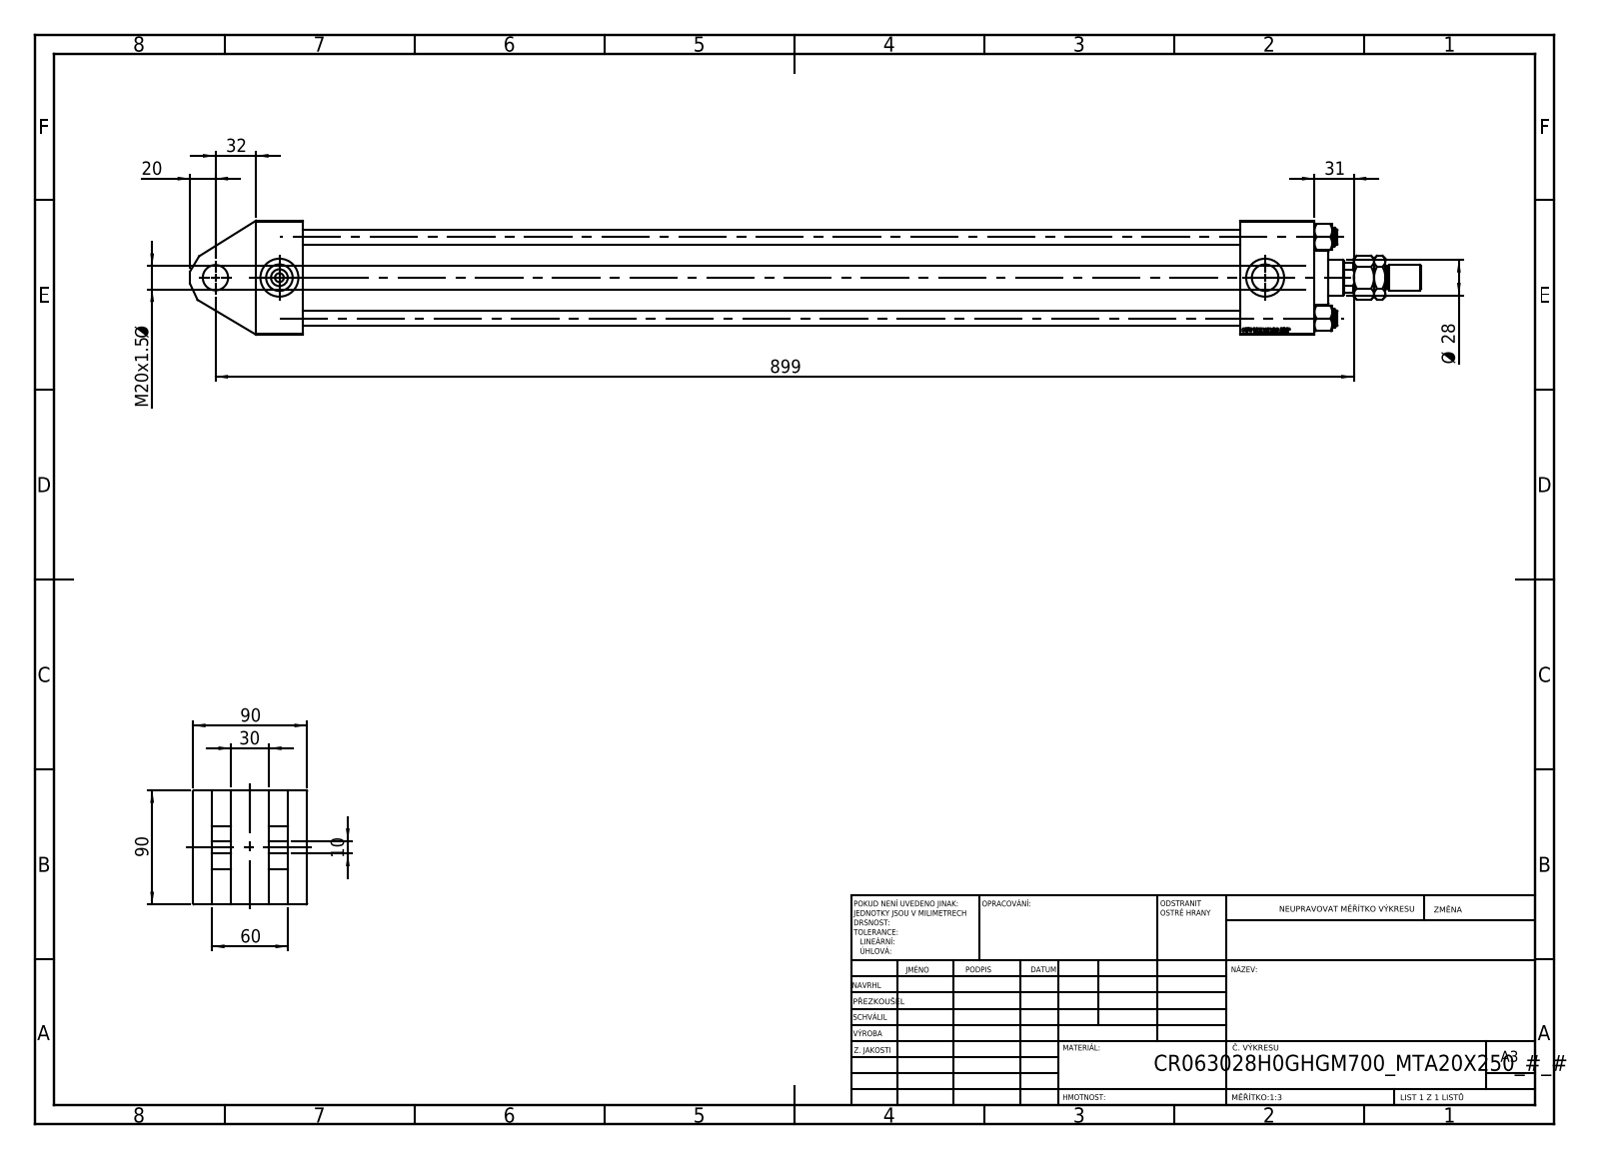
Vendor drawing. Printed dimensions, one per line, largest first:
899
90
90
60
32
31
30
Ø 28
20
M20x1.5 Ø
10
